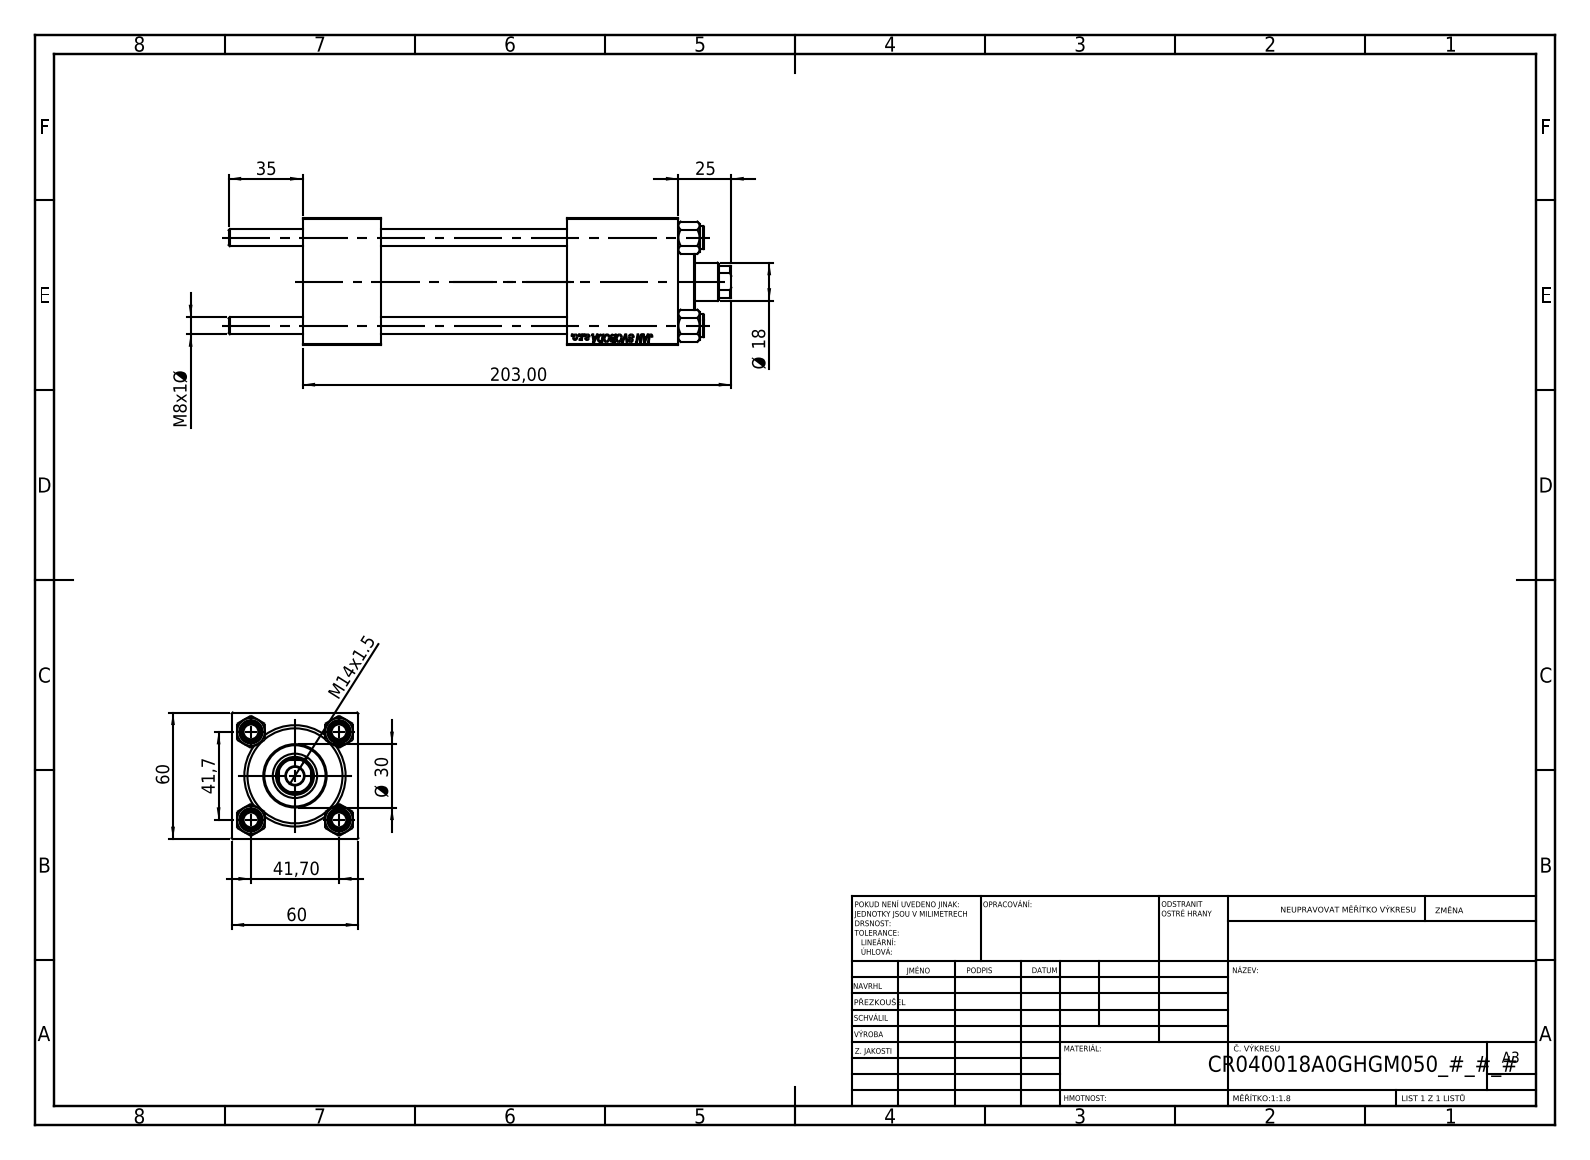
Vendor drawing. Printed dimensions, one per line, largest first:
203,00
60
60
41,7
41,70
35
Ø 30
25
Ø 18
M14x1.5
M8x1 Ø
